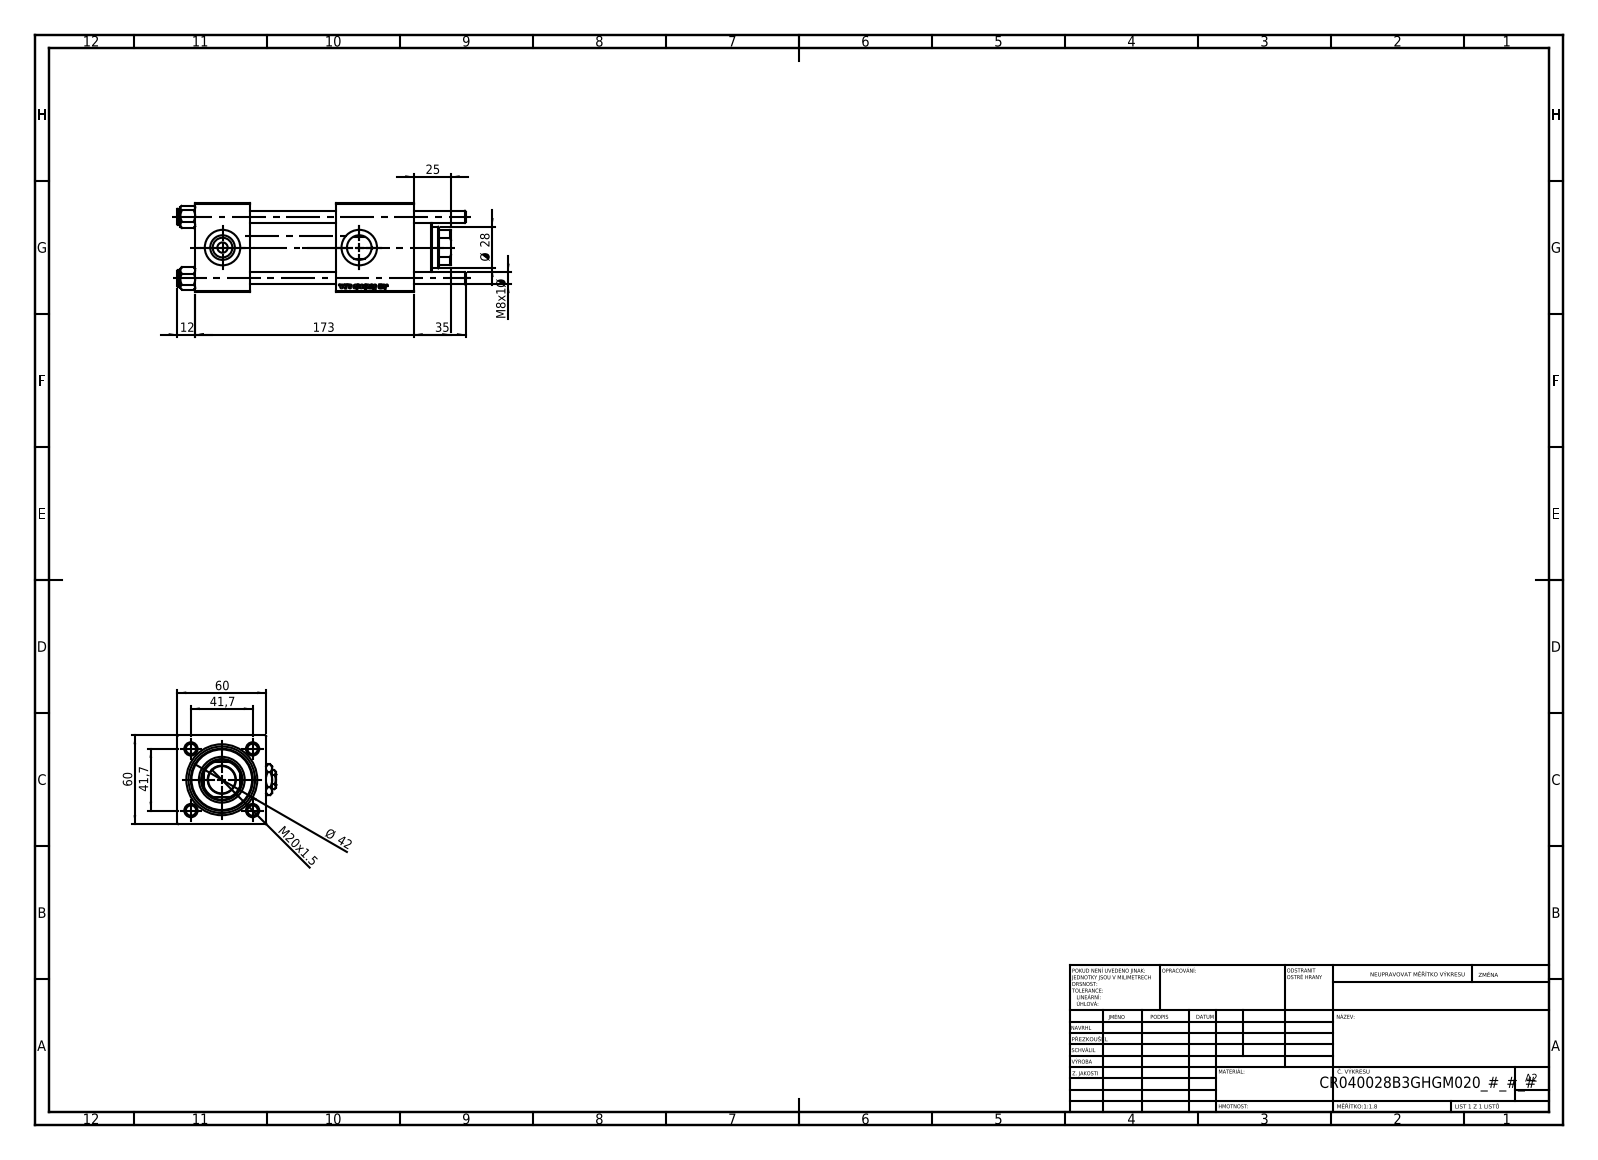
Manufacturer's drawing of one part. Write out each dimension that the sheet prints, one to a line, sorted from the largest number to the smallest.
173
60
60
Ø 42
41,7
41,7
35
Ø 28
25
M20x1.5
12
M8x1 Ø
